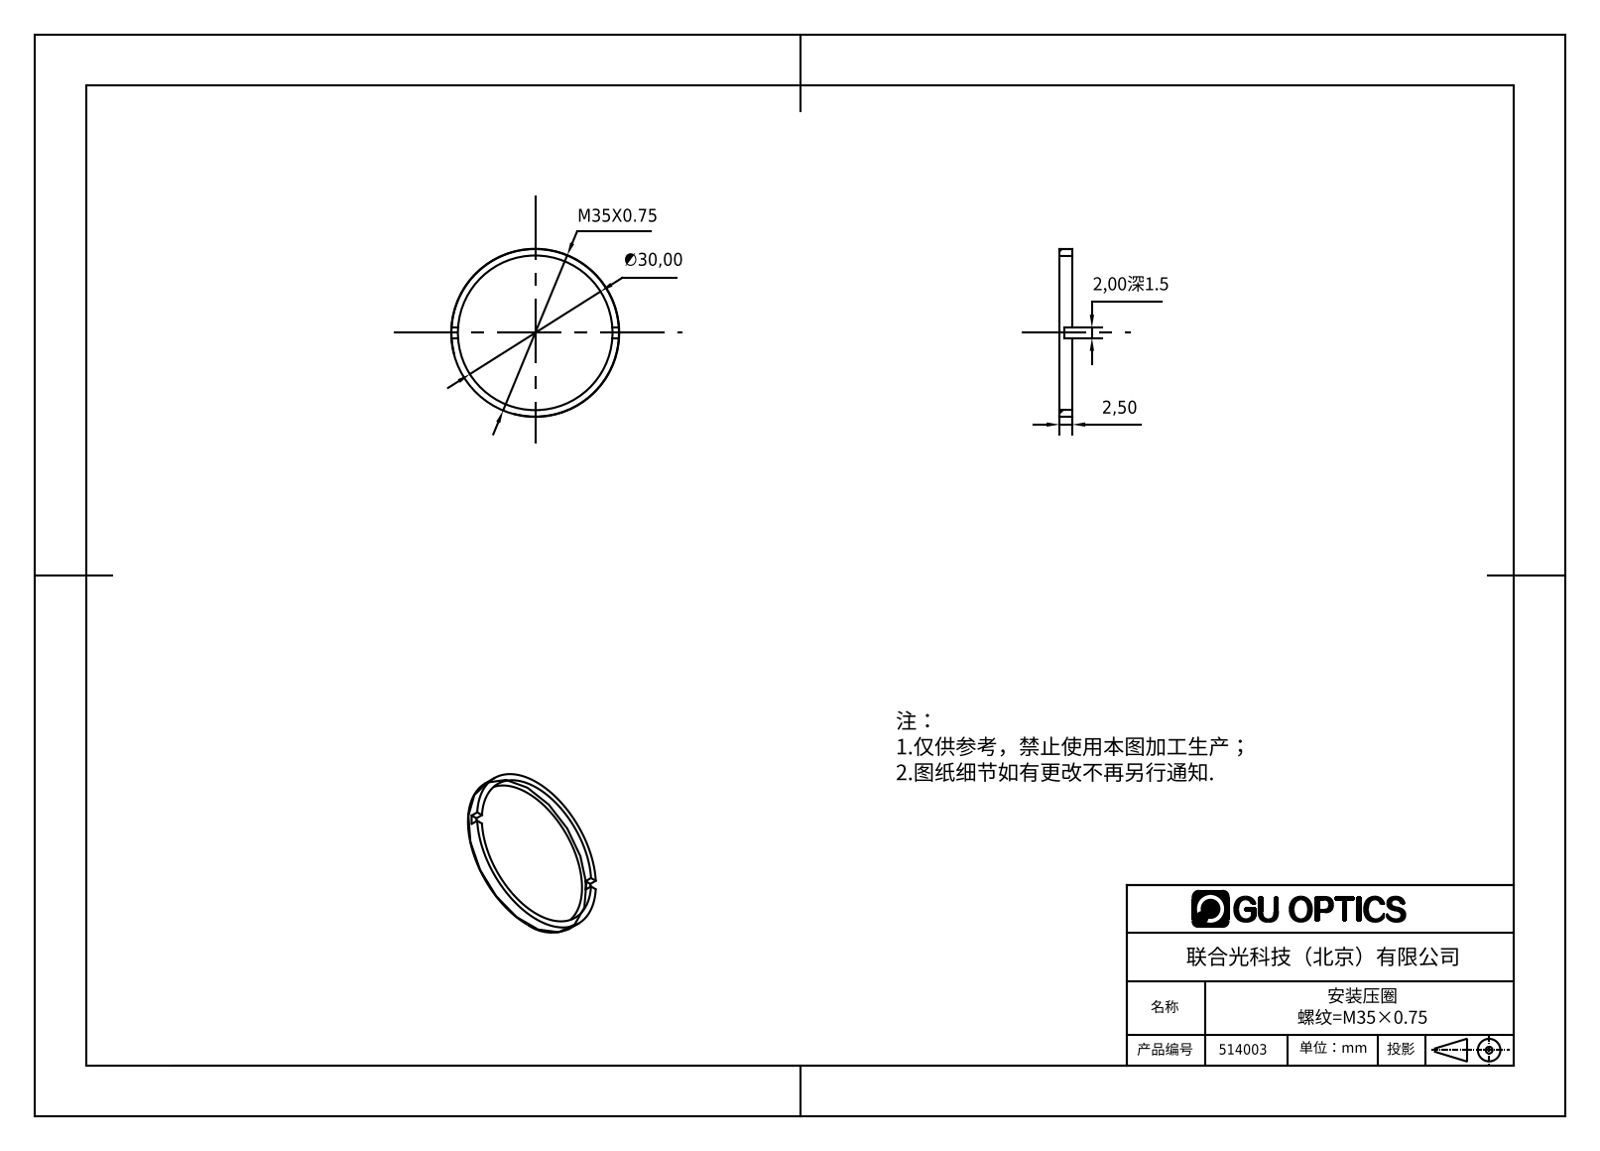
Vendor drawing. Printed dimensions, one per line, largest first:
M35X0.75
∅30,00
2,50
2,00深1.5
